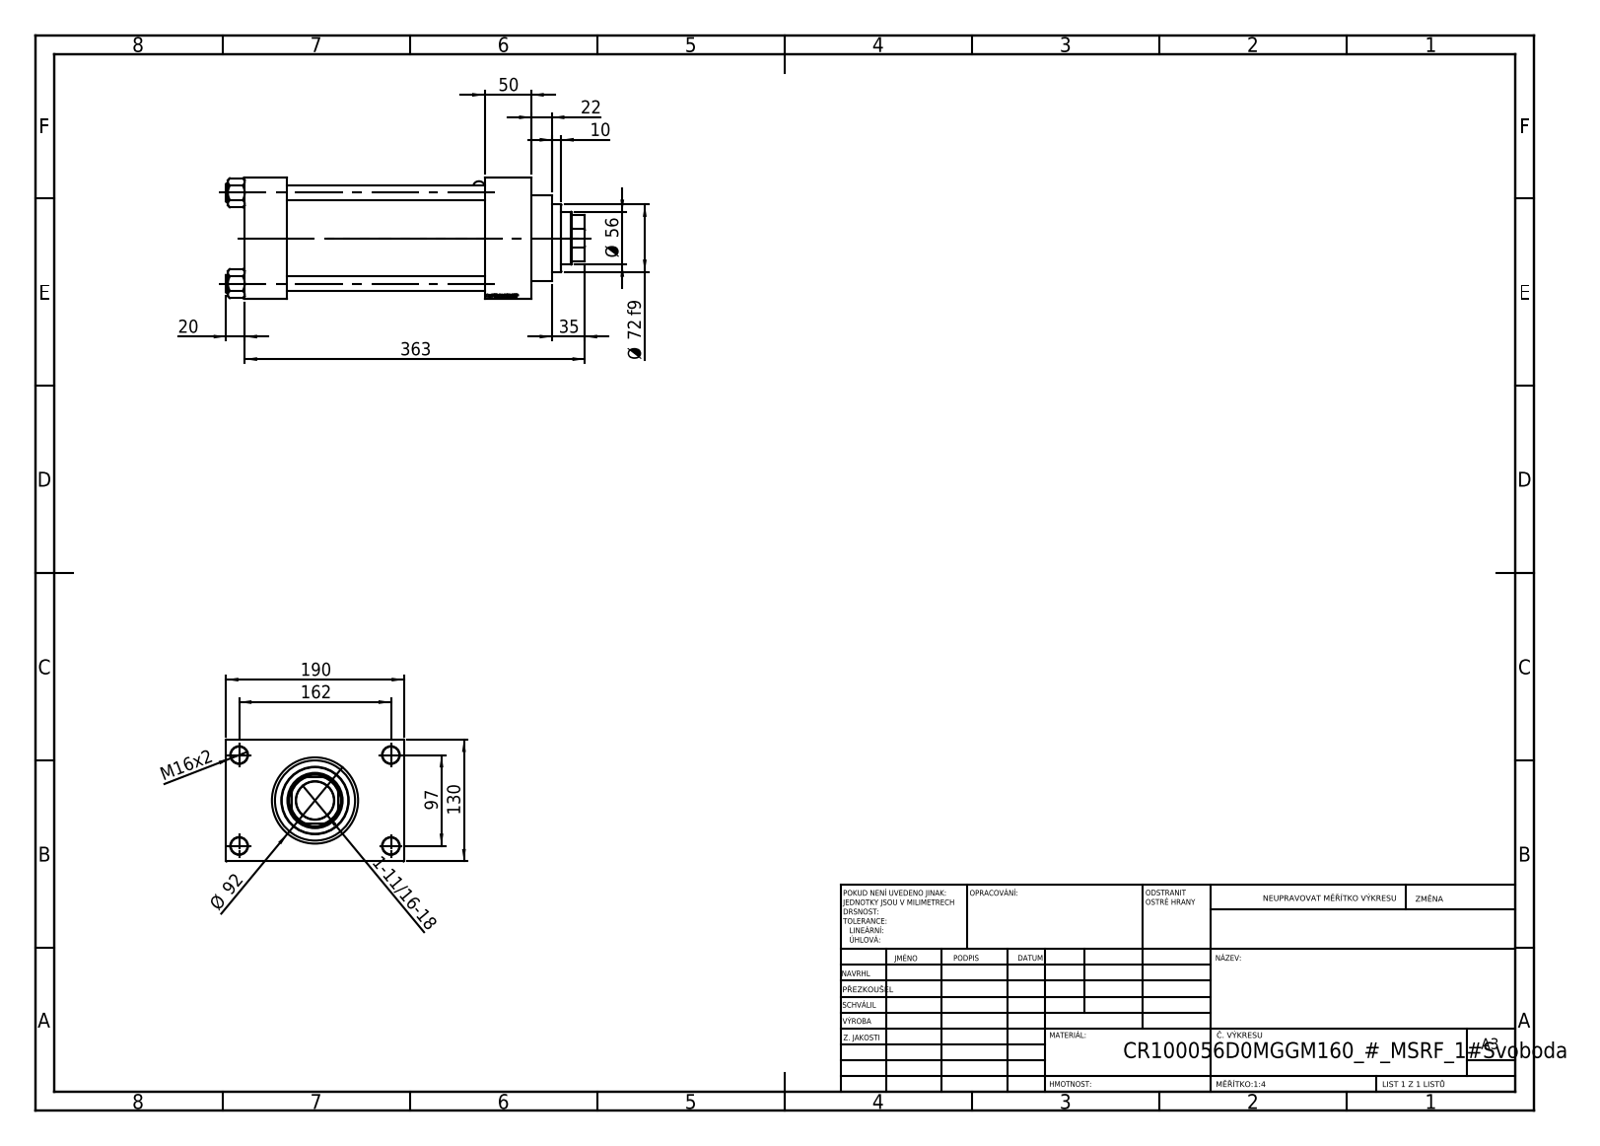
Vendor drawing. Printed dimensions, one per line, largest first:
363
190
162
130
97
Ø 92
Ø 72 f9
Ø 56
50
35
22
20
M16x2
10
1-11/16-18
